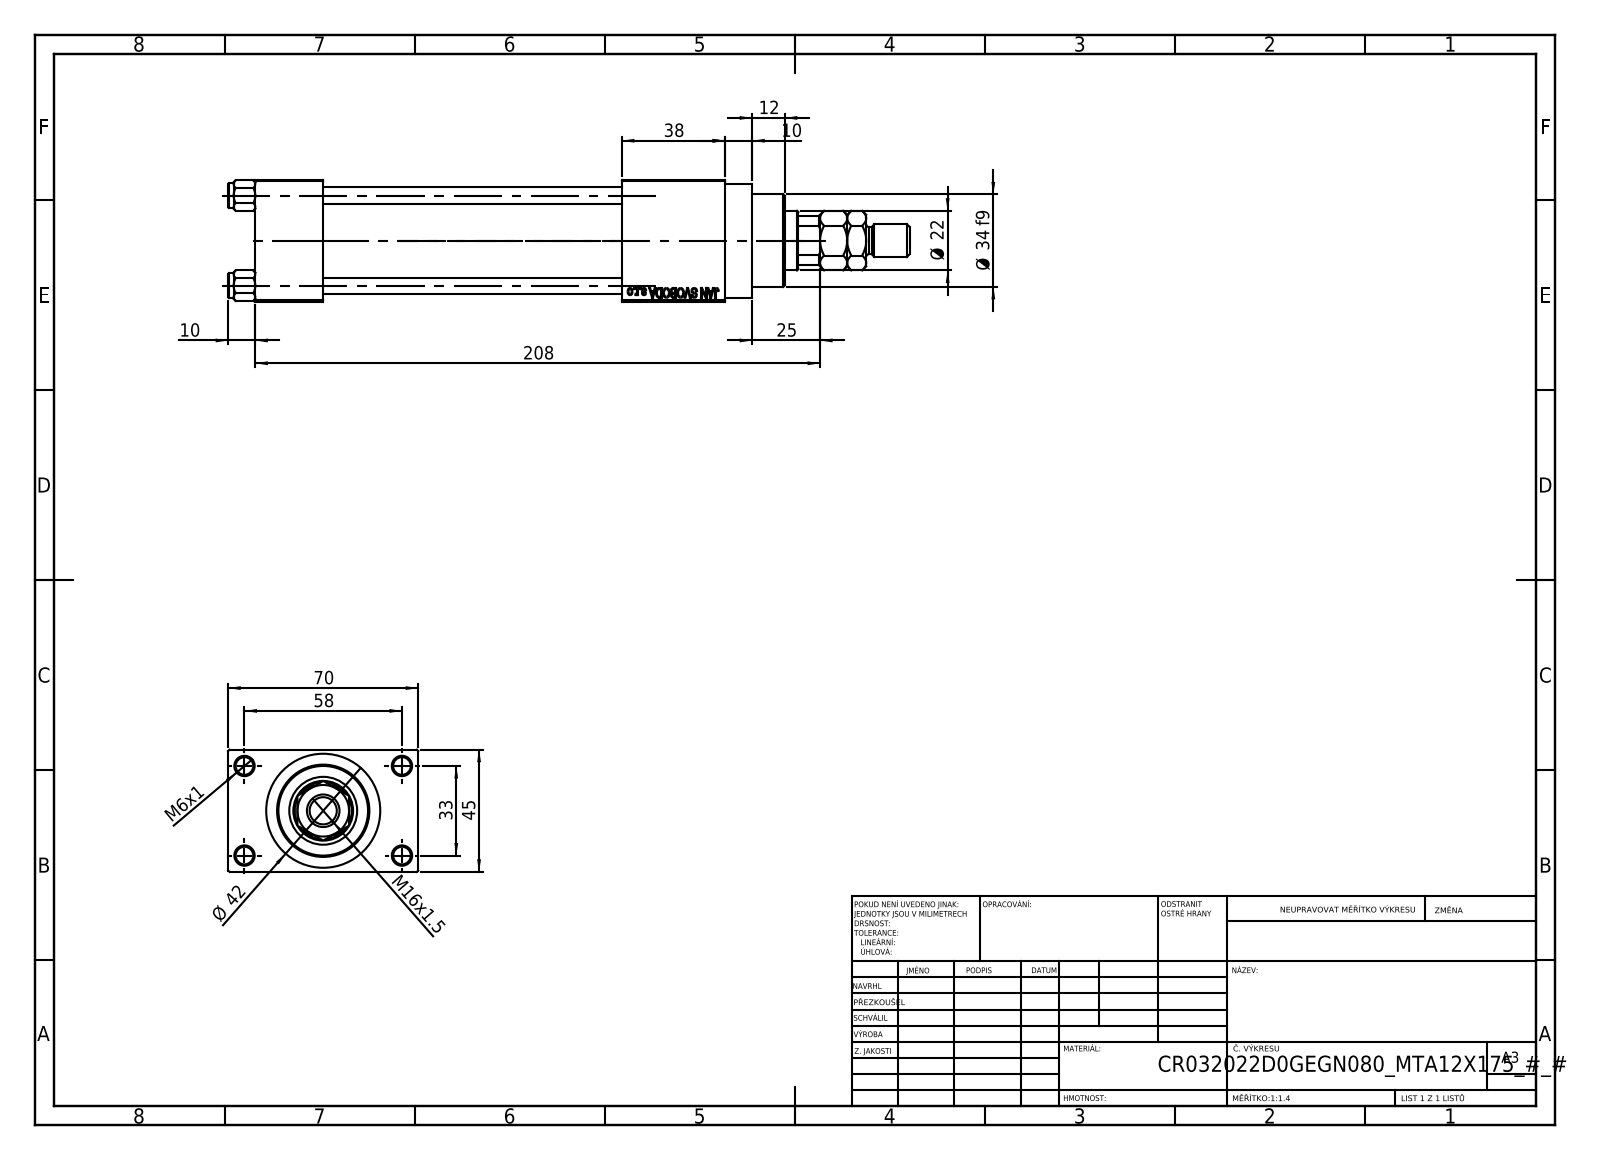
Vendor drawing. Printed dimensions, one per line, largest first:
208
70
58
45
Ø 42
38
Ø 34 f9
33
25
Ø 22
M16x1.5
12
10
10
M6x1
